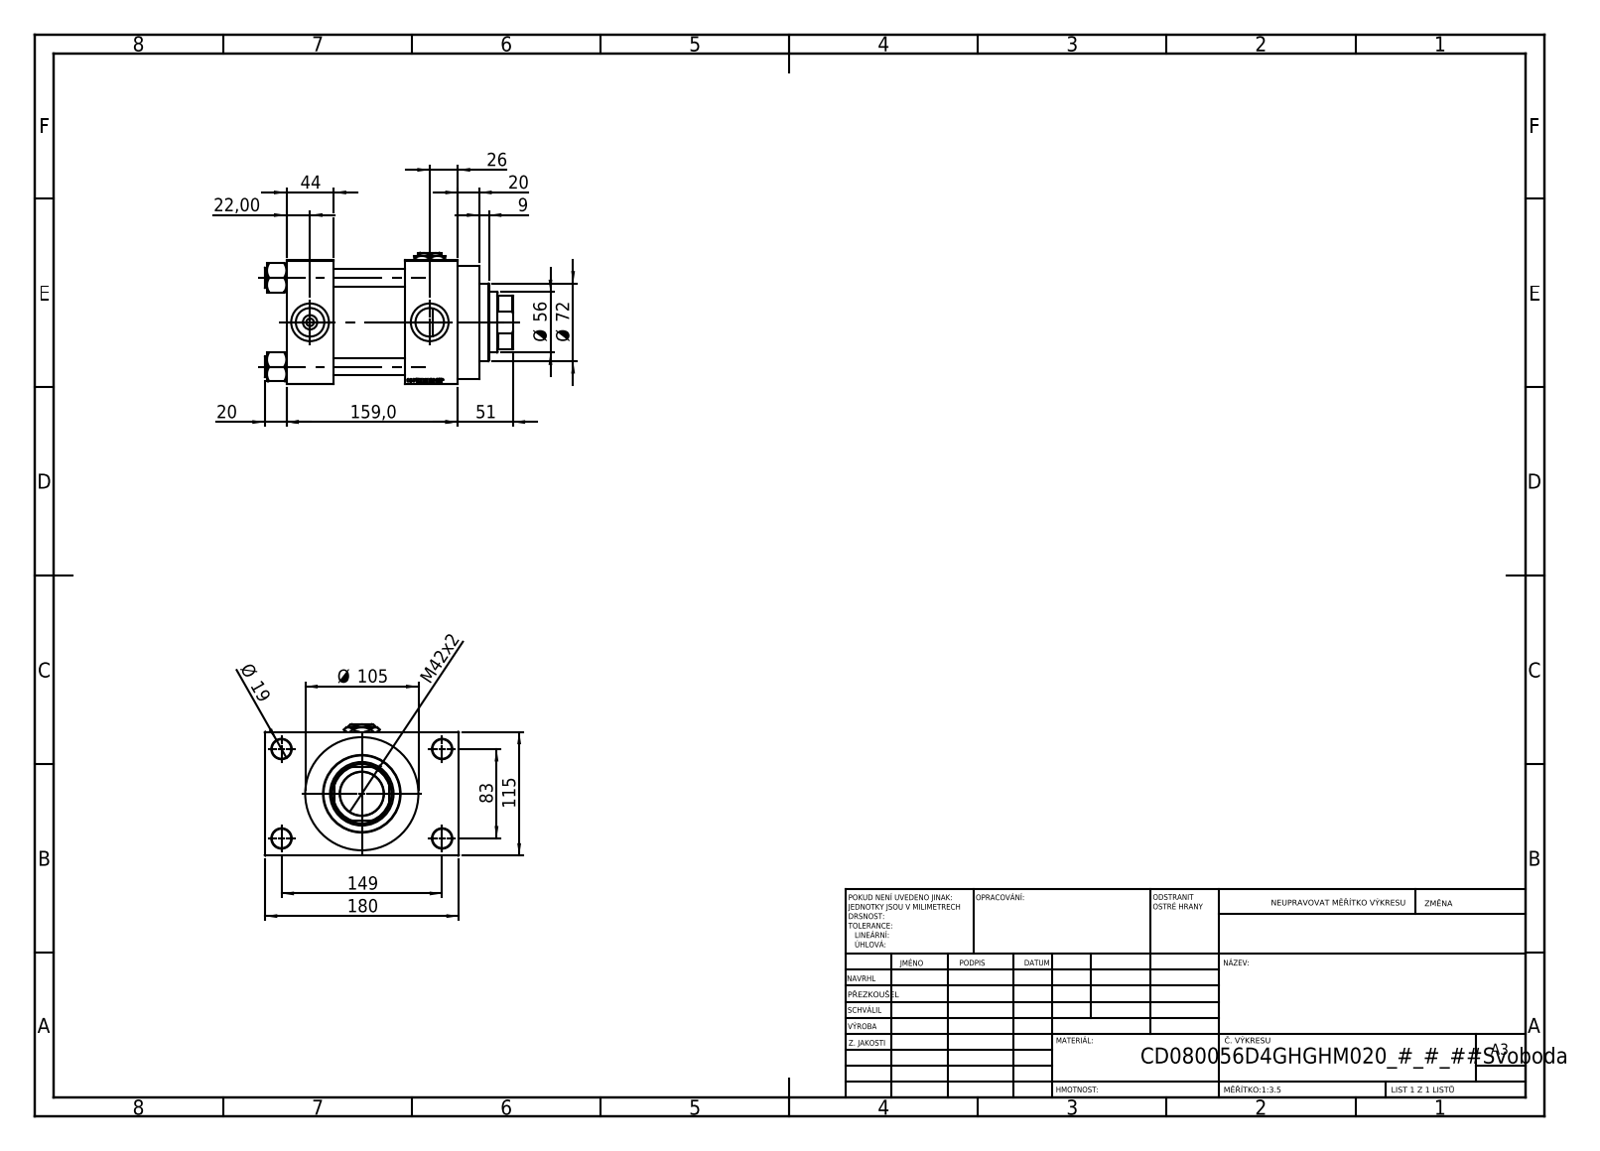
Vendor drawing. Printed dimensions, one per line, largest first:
180
159,0
149
115
Ø 105
83
Ø 72
Ø 56
51
44
M42x2
26
22,00
20
20
Ø 19
9
